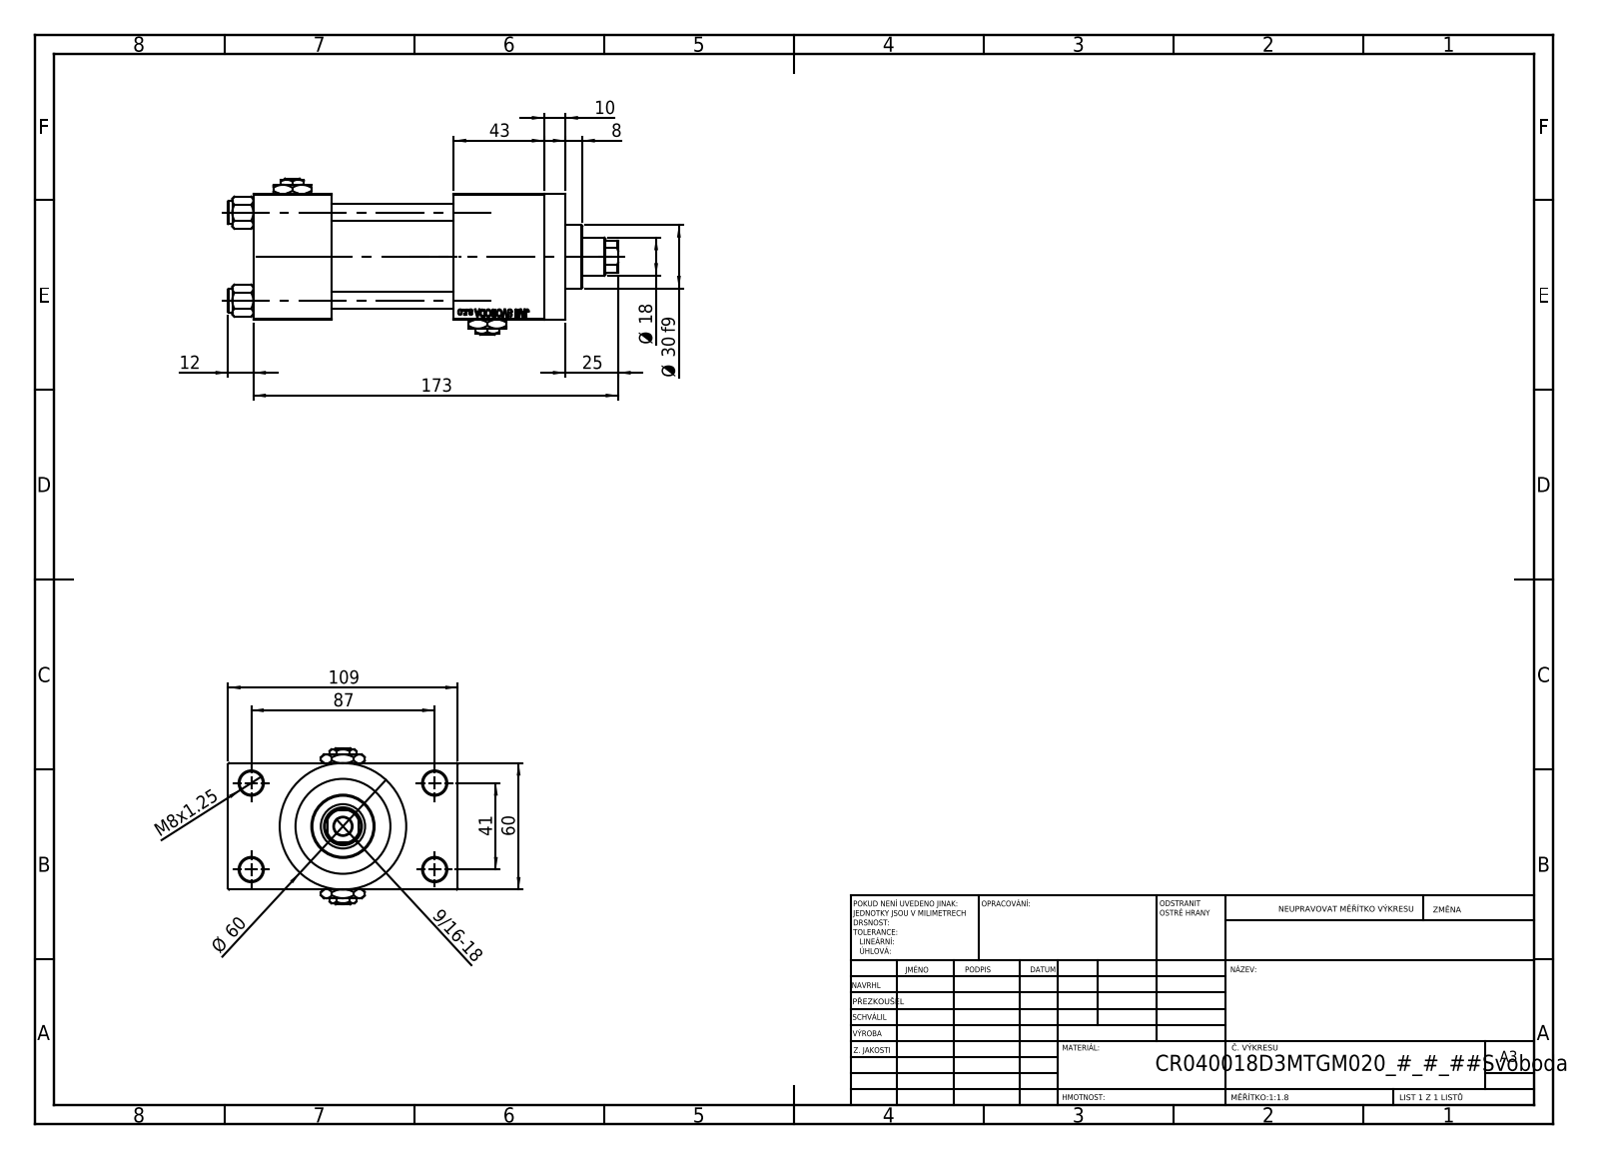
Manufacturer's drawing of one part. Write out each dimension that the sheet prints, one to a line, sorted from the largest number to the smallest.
173
109
87
Ø 60
60
43
41
Ø 30 f9
25
Ø 18
12
10
8
M8x1.25
9/16-18
